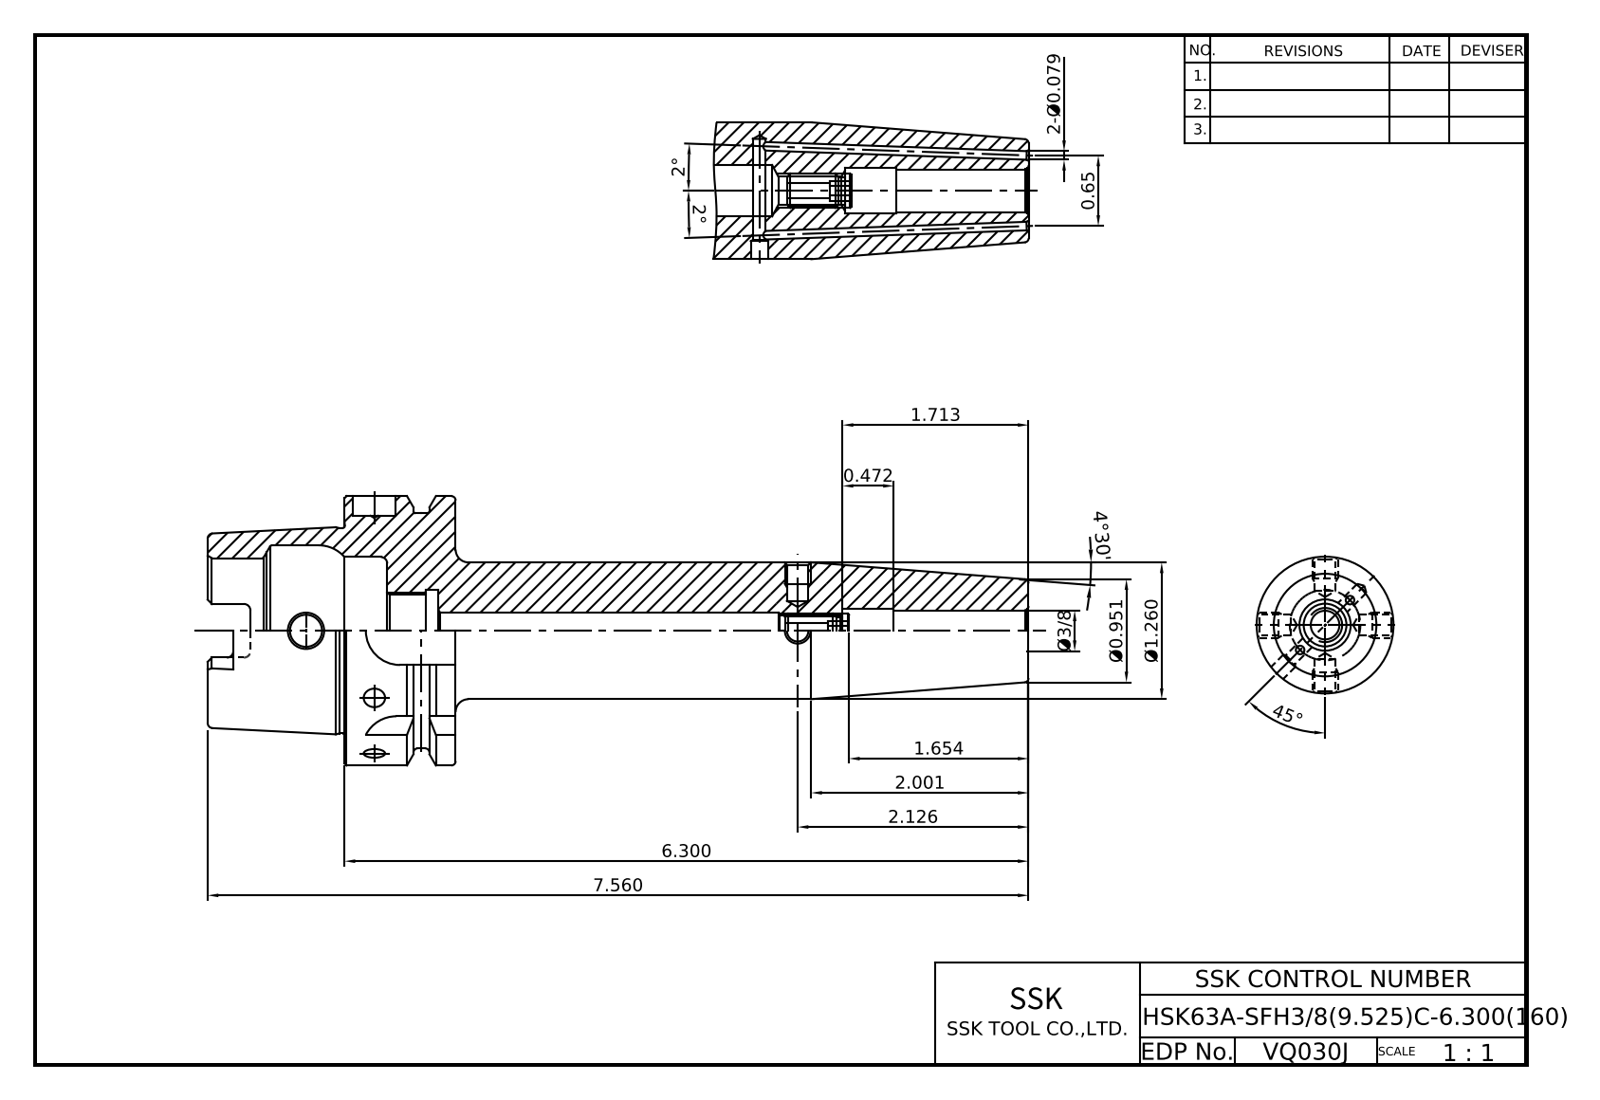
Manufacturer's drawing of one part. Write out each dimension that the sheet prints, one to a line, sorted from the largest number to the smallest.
45°
7.560
6.300
4°30'
2.126
2.001
2°
2°
1.713
1.654
Ø1.260
Ø0.951
0.65
0.472
Ø3/8
2-Ø0.079
